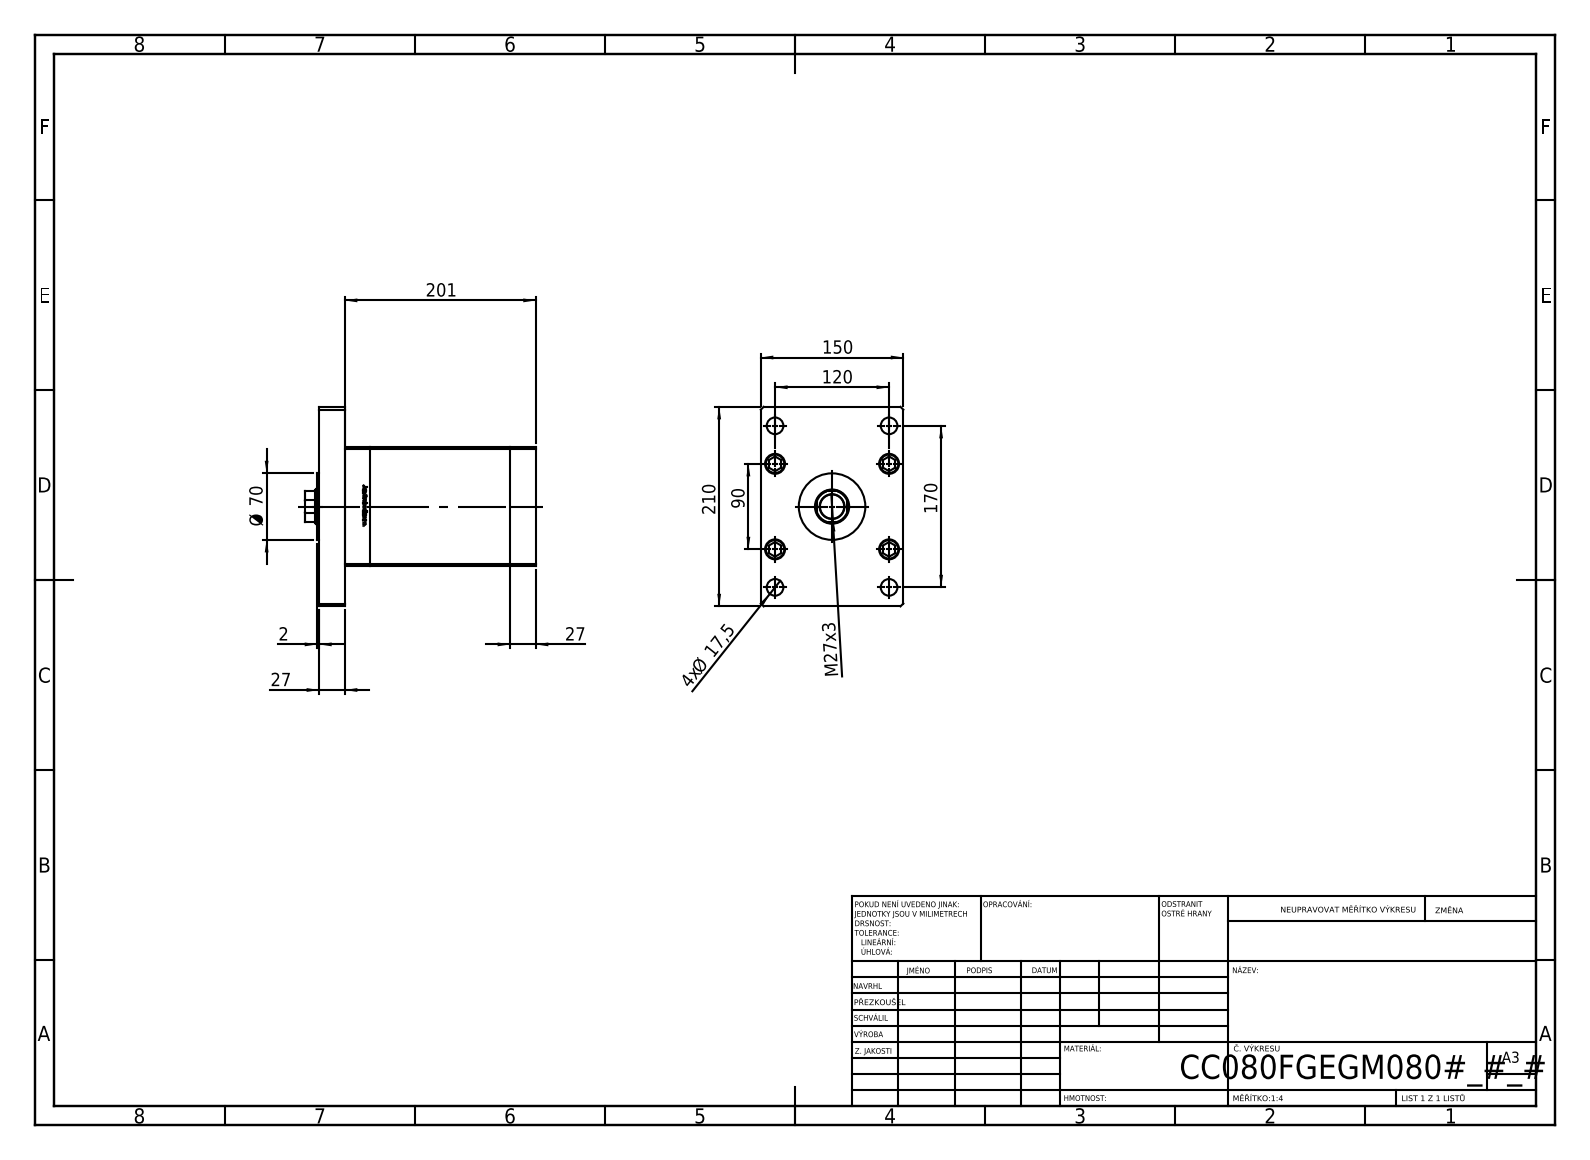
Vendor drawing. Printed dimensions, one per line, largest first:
210
201
170
150
120
90
Ø 70
27
27
M27x3
4x Ø 17,5
2
